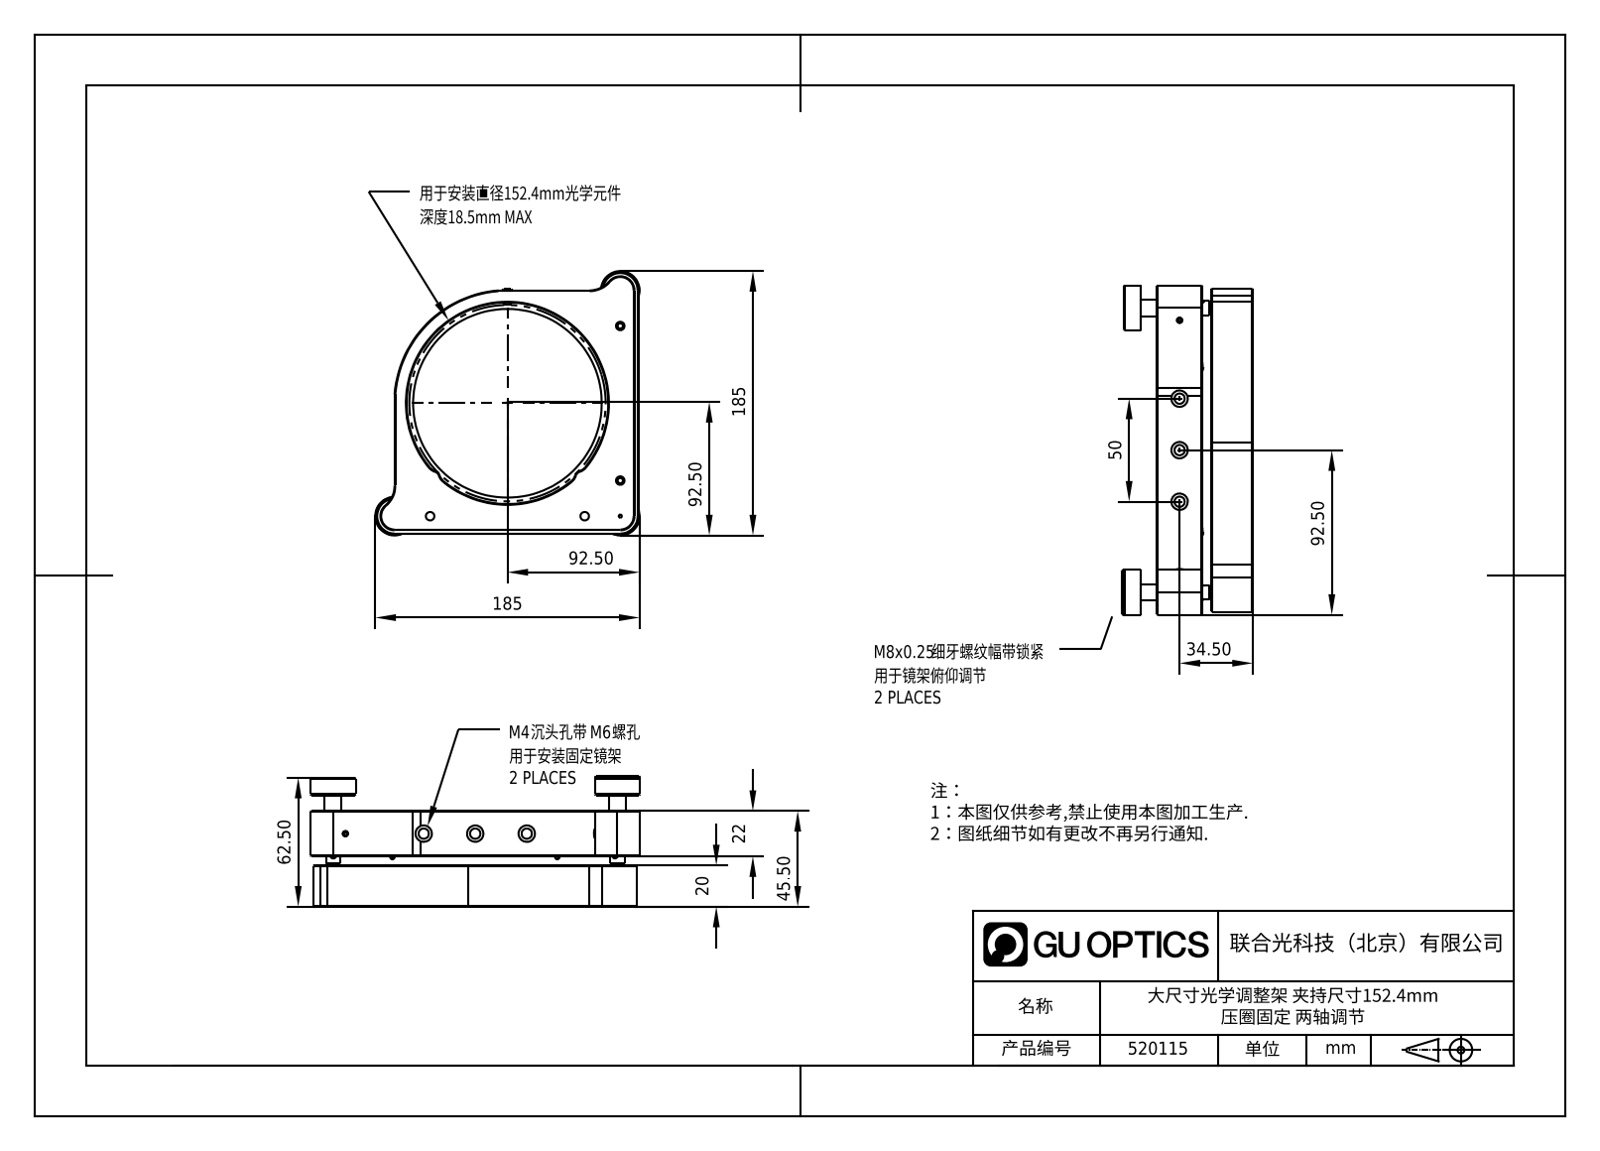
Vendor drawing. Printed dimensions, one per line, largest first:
185
185
92.50
92.50
92.50
62.50
50
45.50
34.50
22
20
